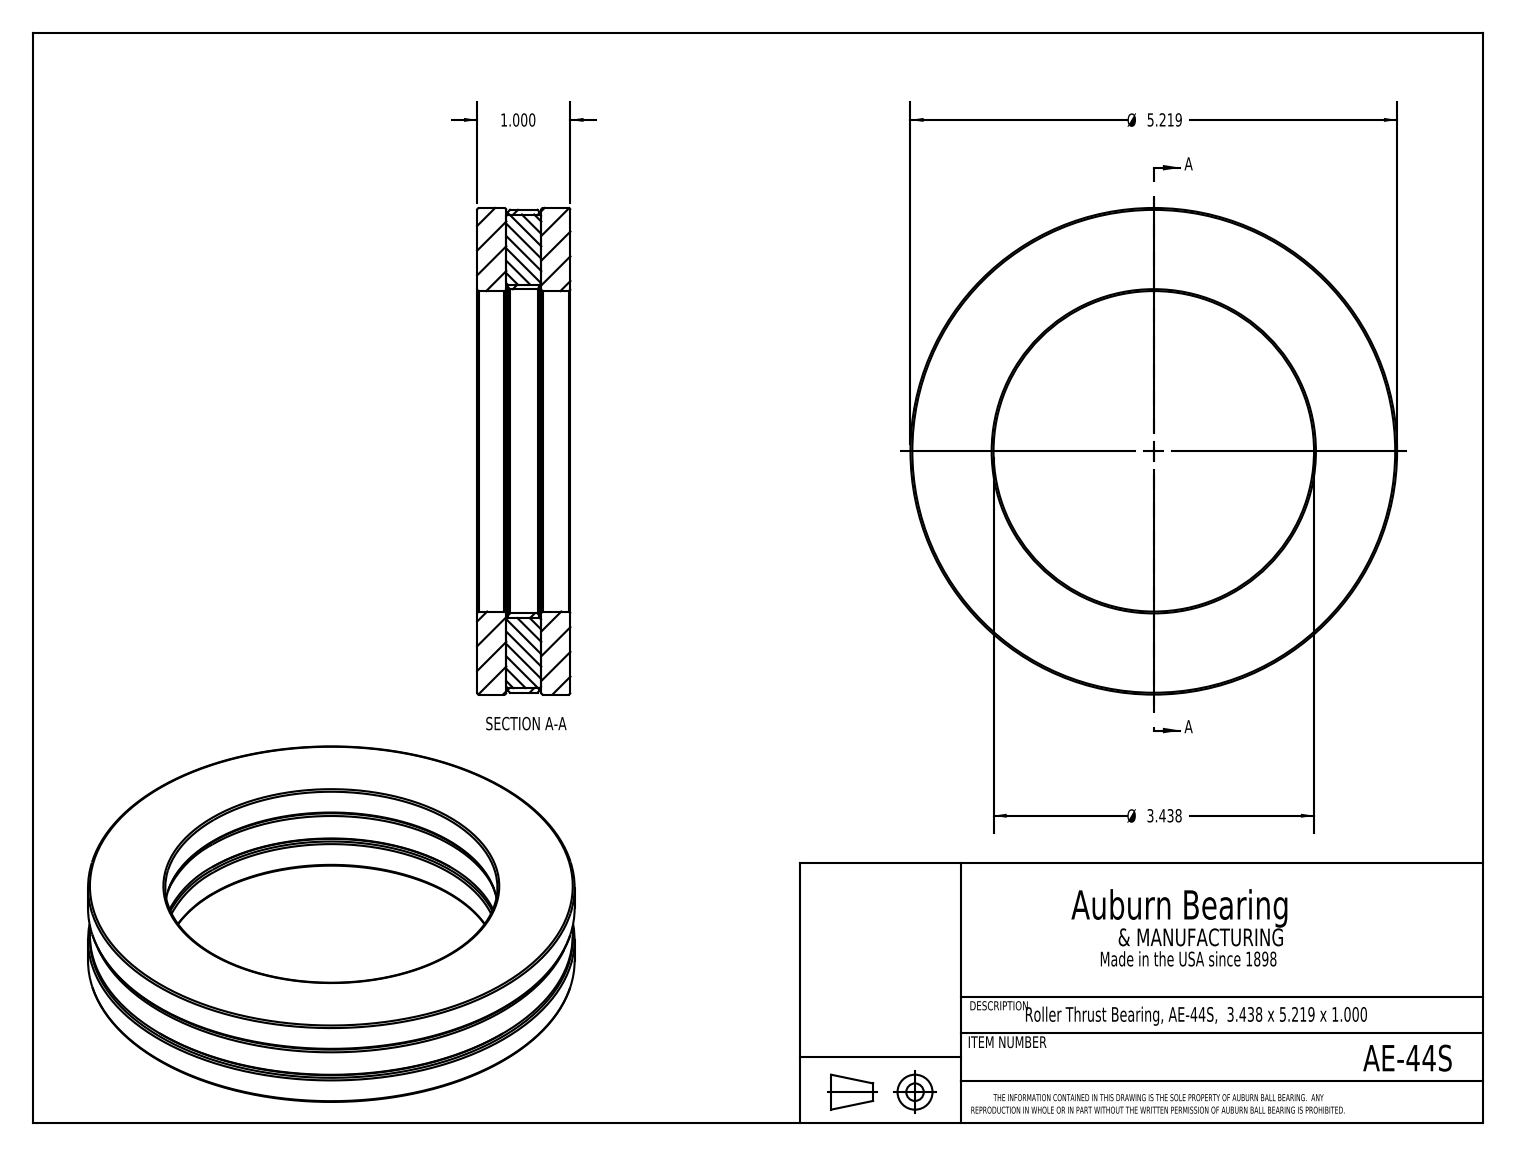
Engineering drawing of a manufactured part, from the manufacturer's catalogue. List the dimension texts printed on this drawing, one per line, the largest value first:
Ø 5.219
Ø 3.438
1.000
